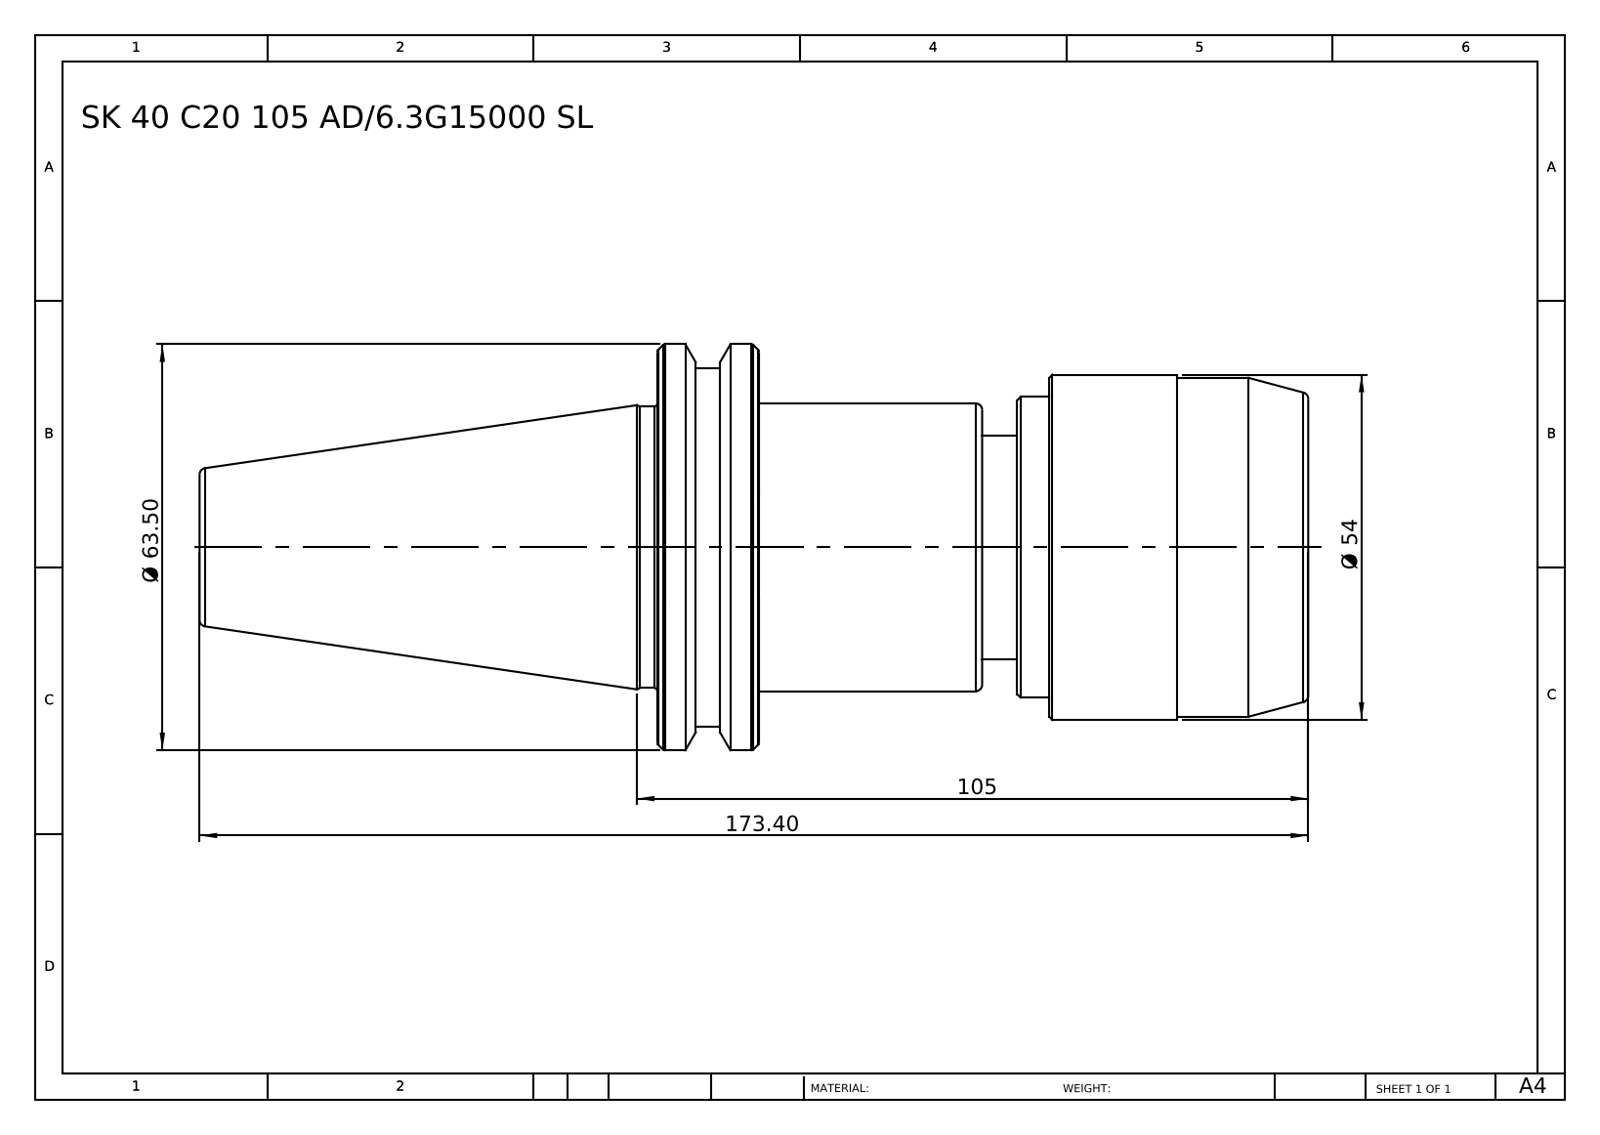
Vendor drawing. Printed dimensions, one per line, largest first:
173.40
105
Ø 63.50
Ø 54
